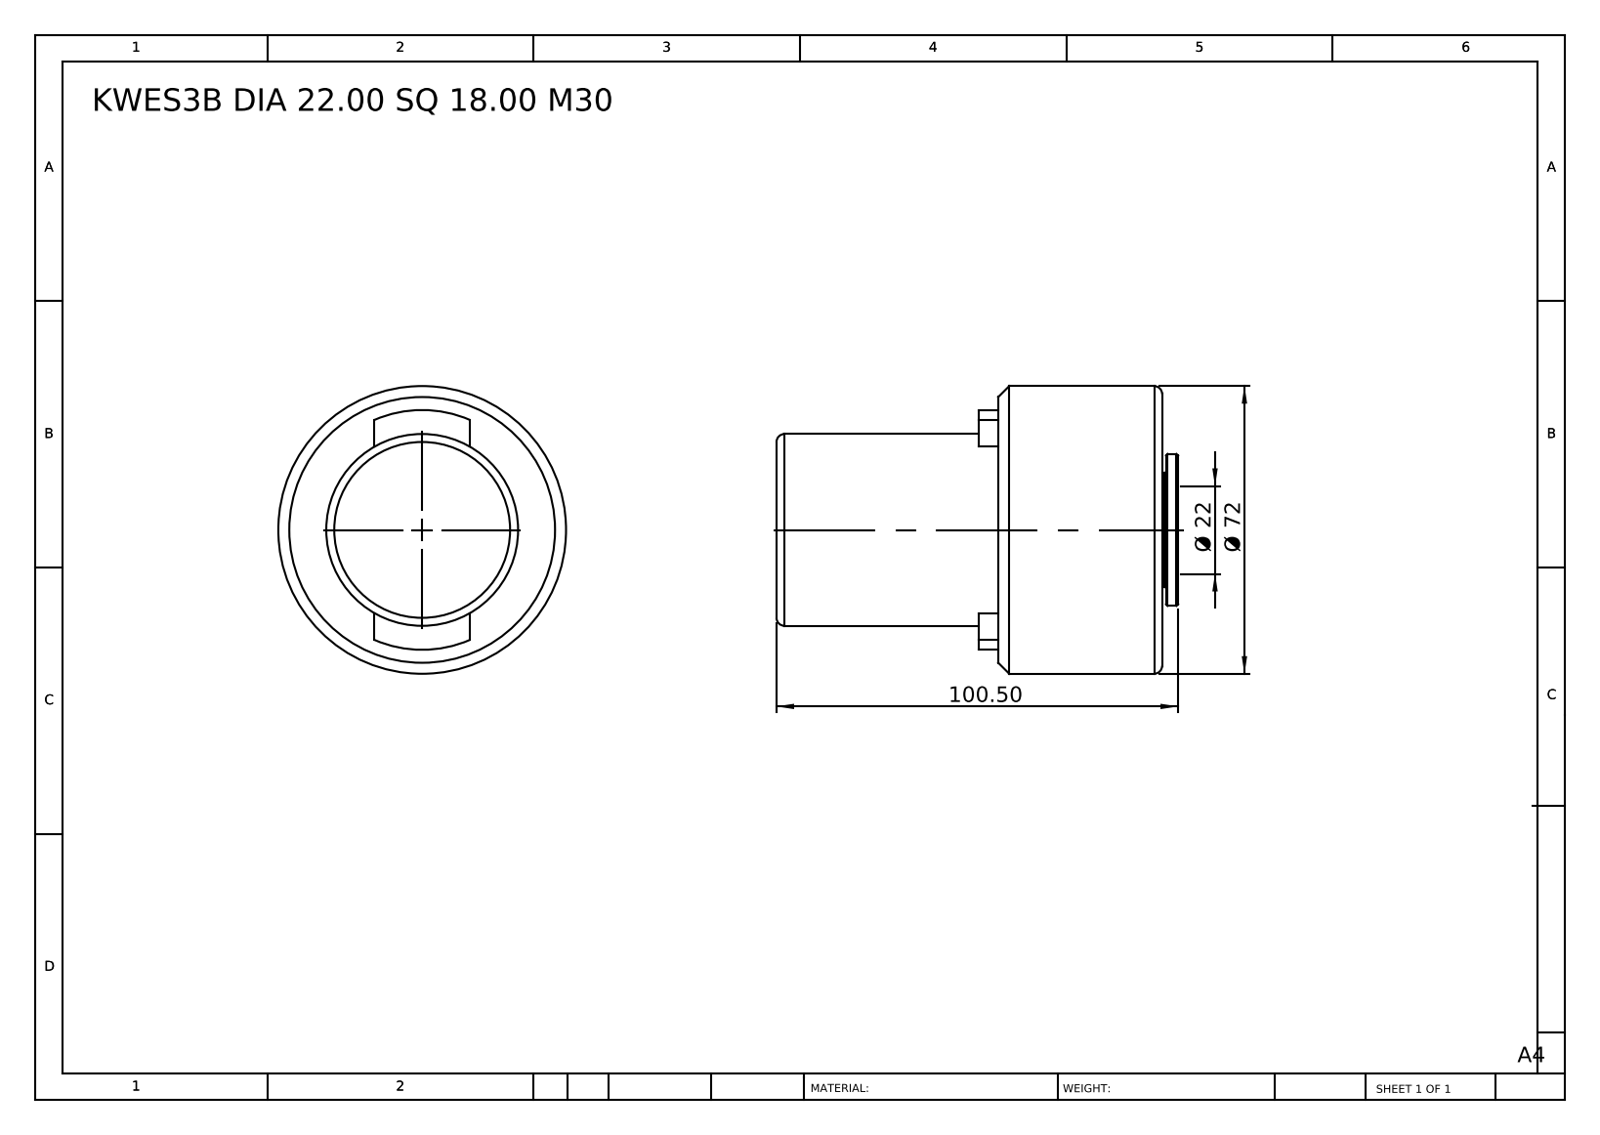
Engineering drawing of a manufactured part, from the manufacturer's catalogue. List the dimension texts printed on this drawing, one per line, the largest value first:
100.50
Ø 72
Ø 22
